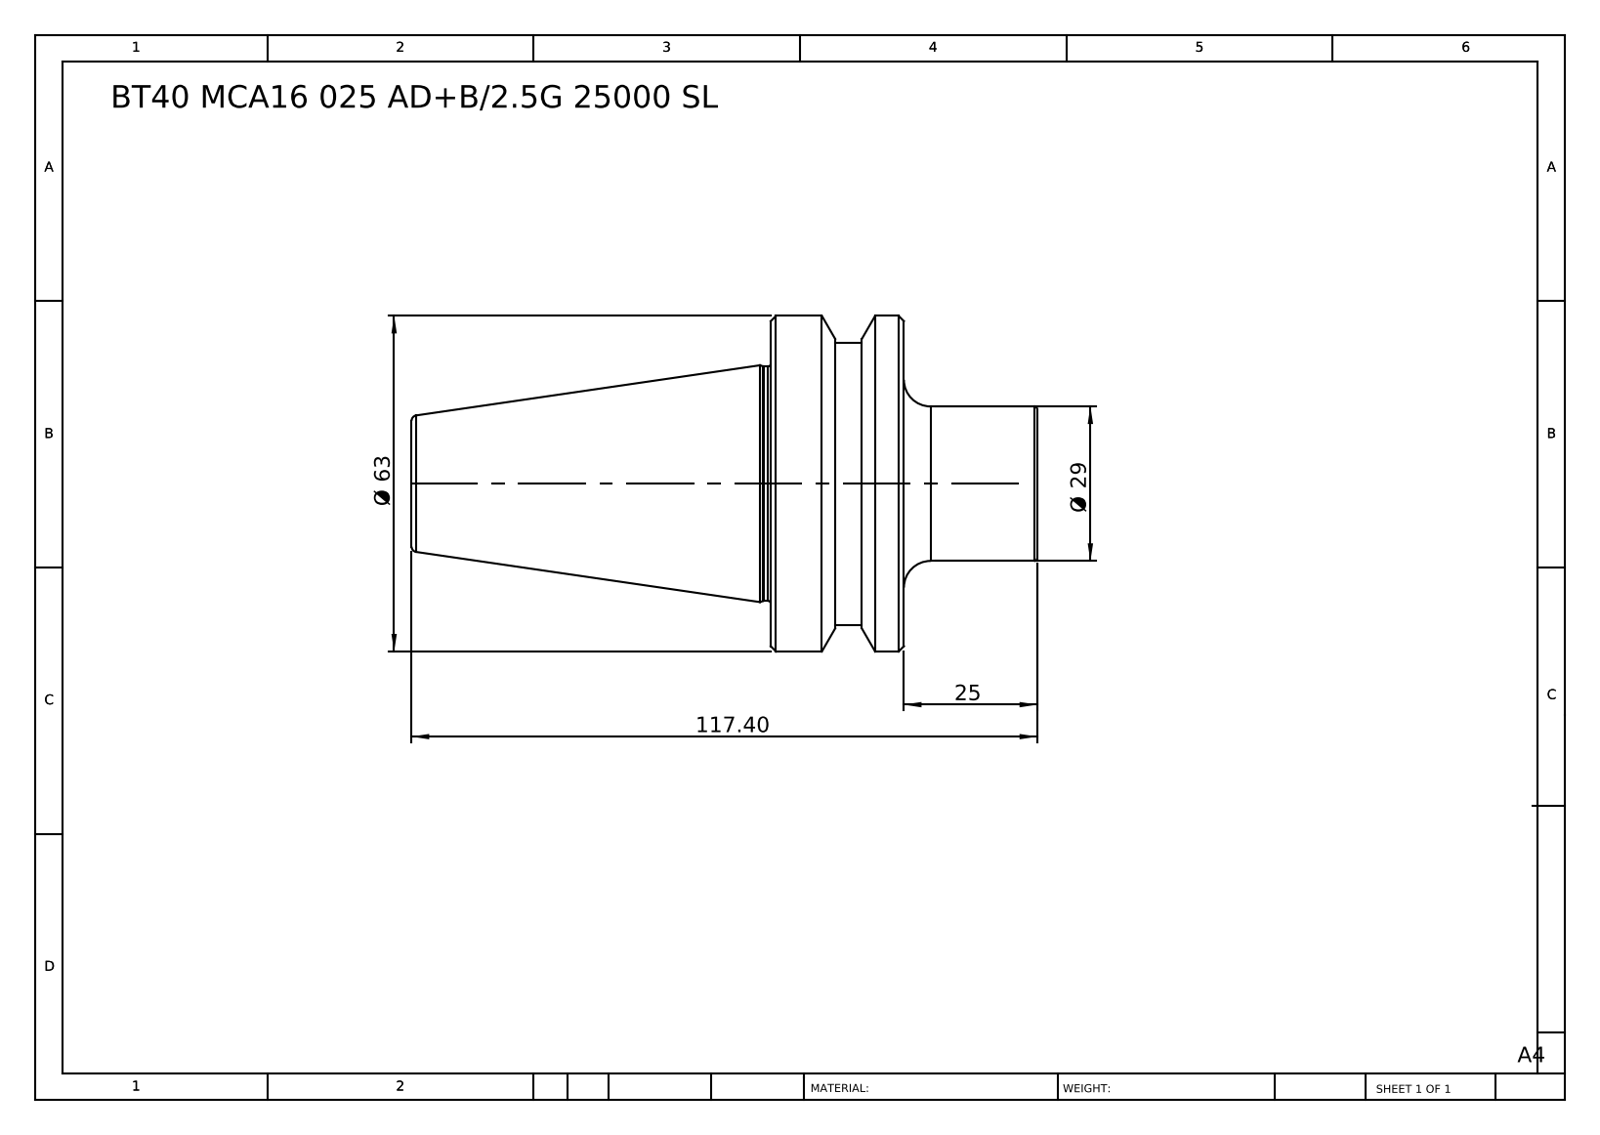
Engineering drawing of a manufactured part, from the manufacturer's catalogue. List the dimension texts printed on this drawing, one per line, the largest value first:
117.40
Ø 63
Ø 29
25
